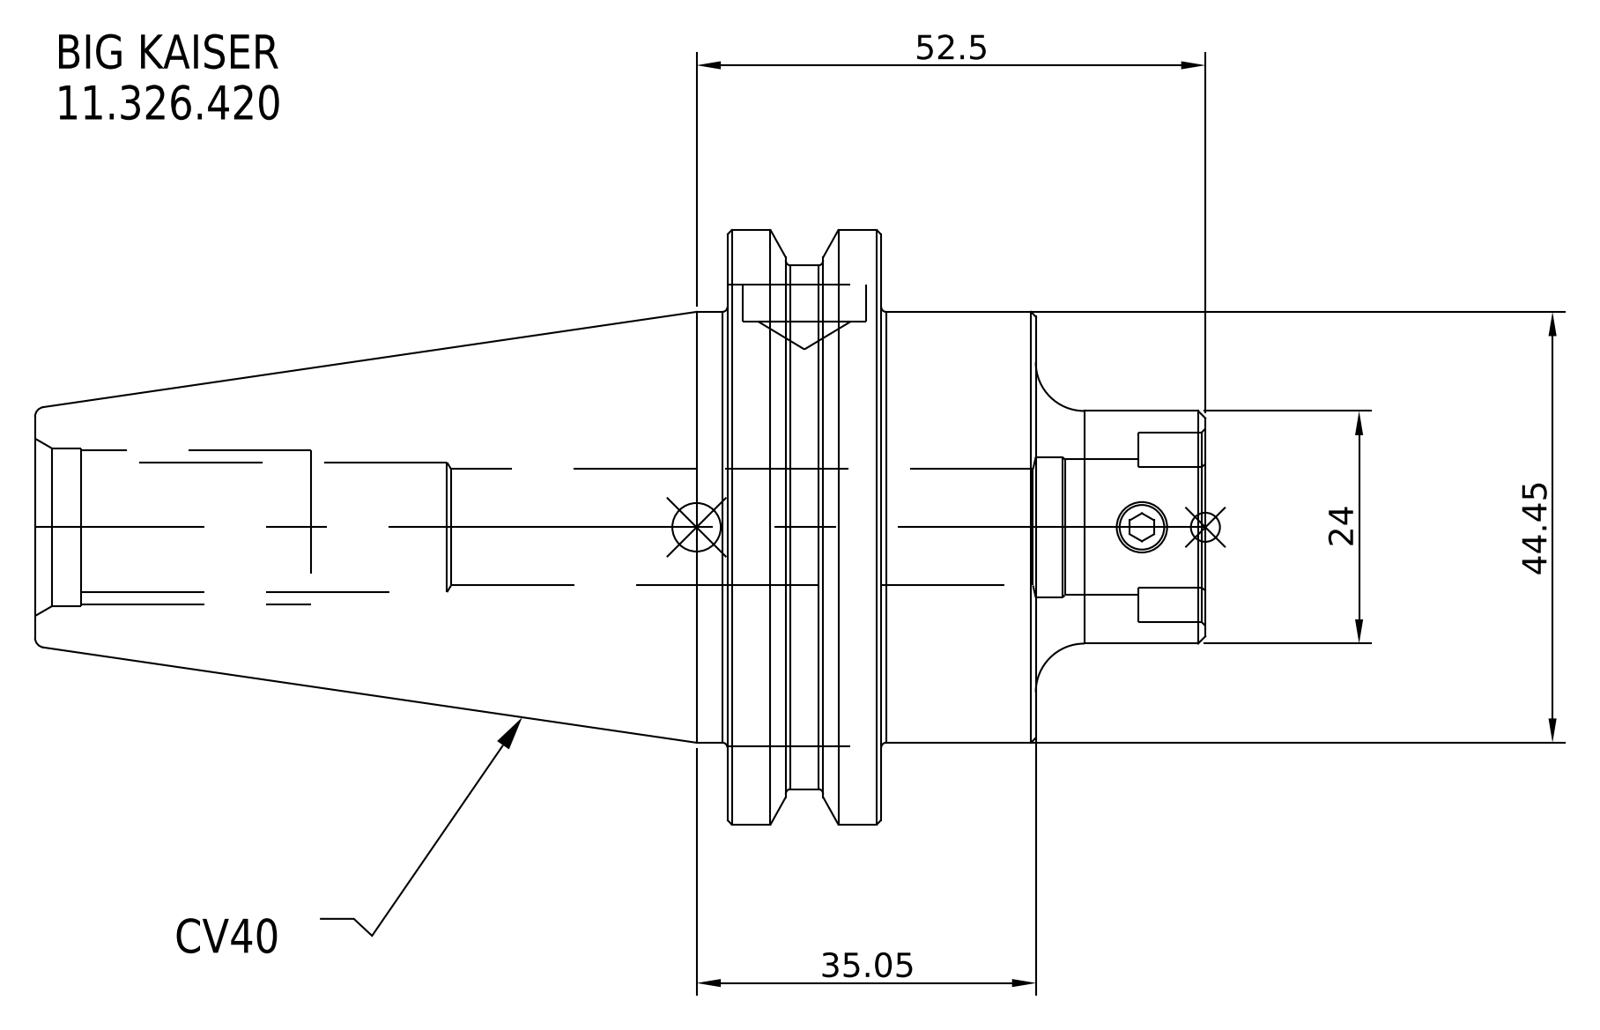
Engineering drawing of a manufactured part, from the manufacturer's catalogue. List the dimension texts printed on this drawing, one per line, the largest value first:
52.5
44.45
35.05
24
